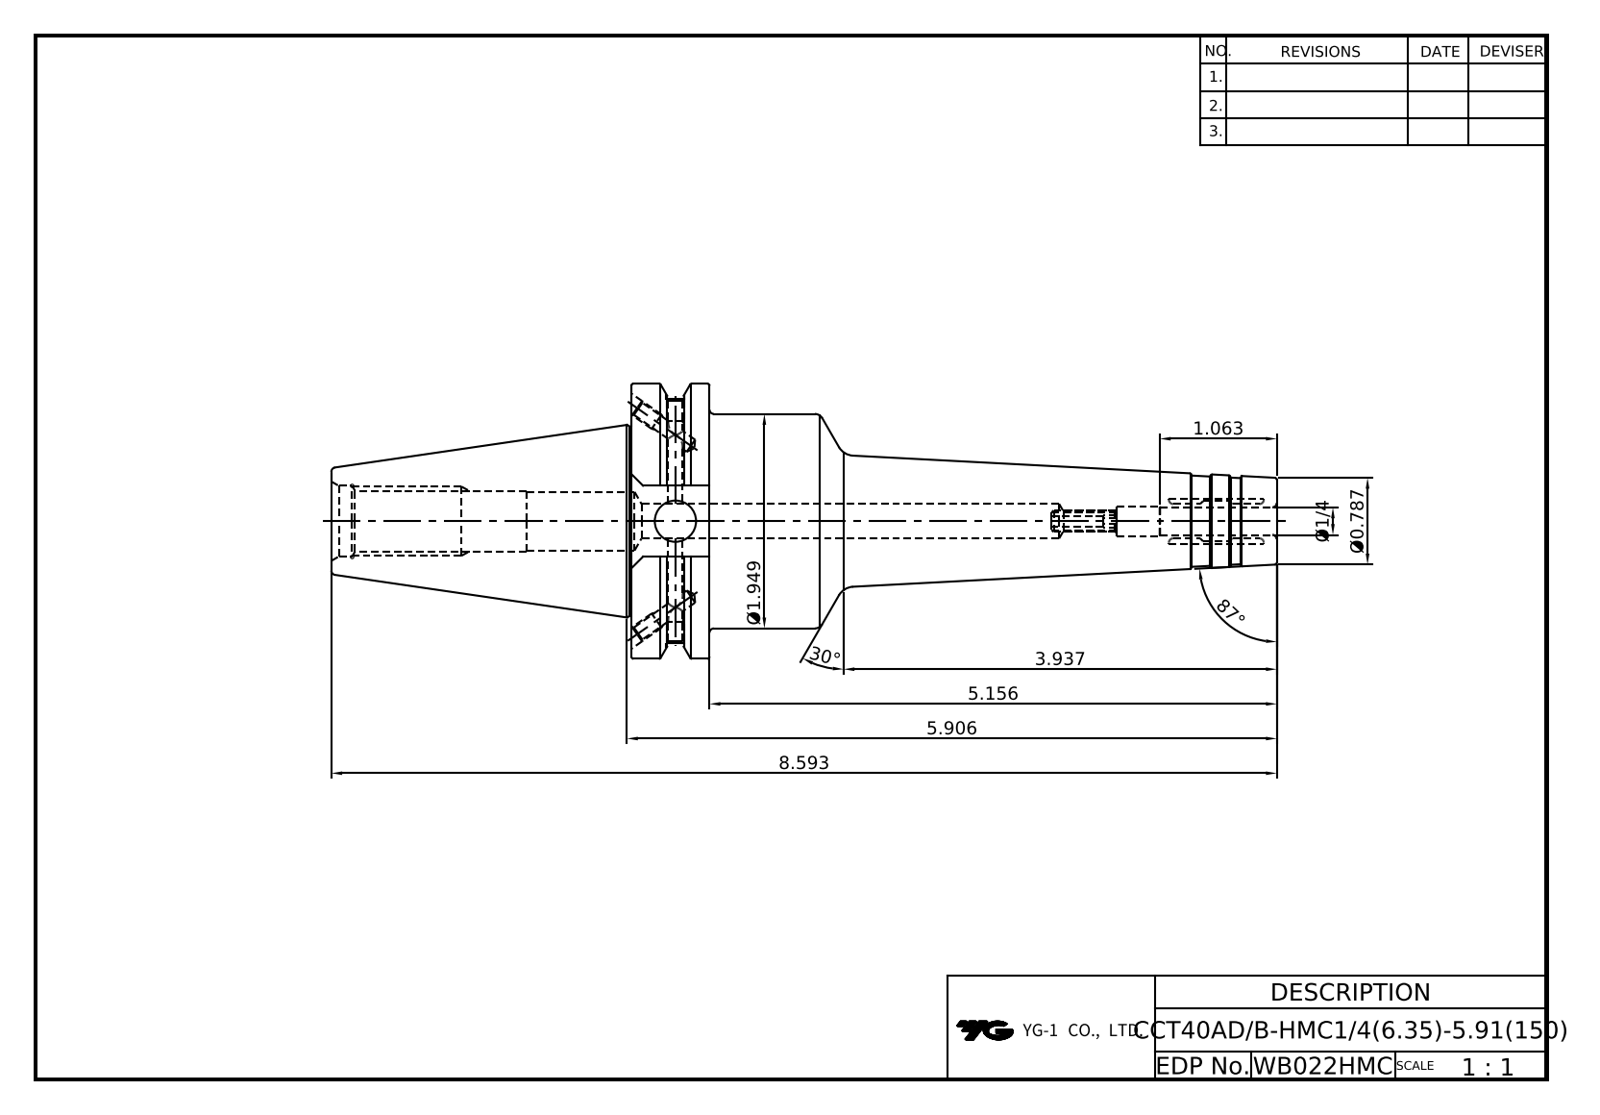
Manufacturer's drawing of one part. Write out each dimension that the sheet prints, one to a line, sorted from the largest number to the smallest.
87°
30°
8.593
5.906
5.156
3.937
Ø1.949
1.063
Ø0.787
Ø1/4
